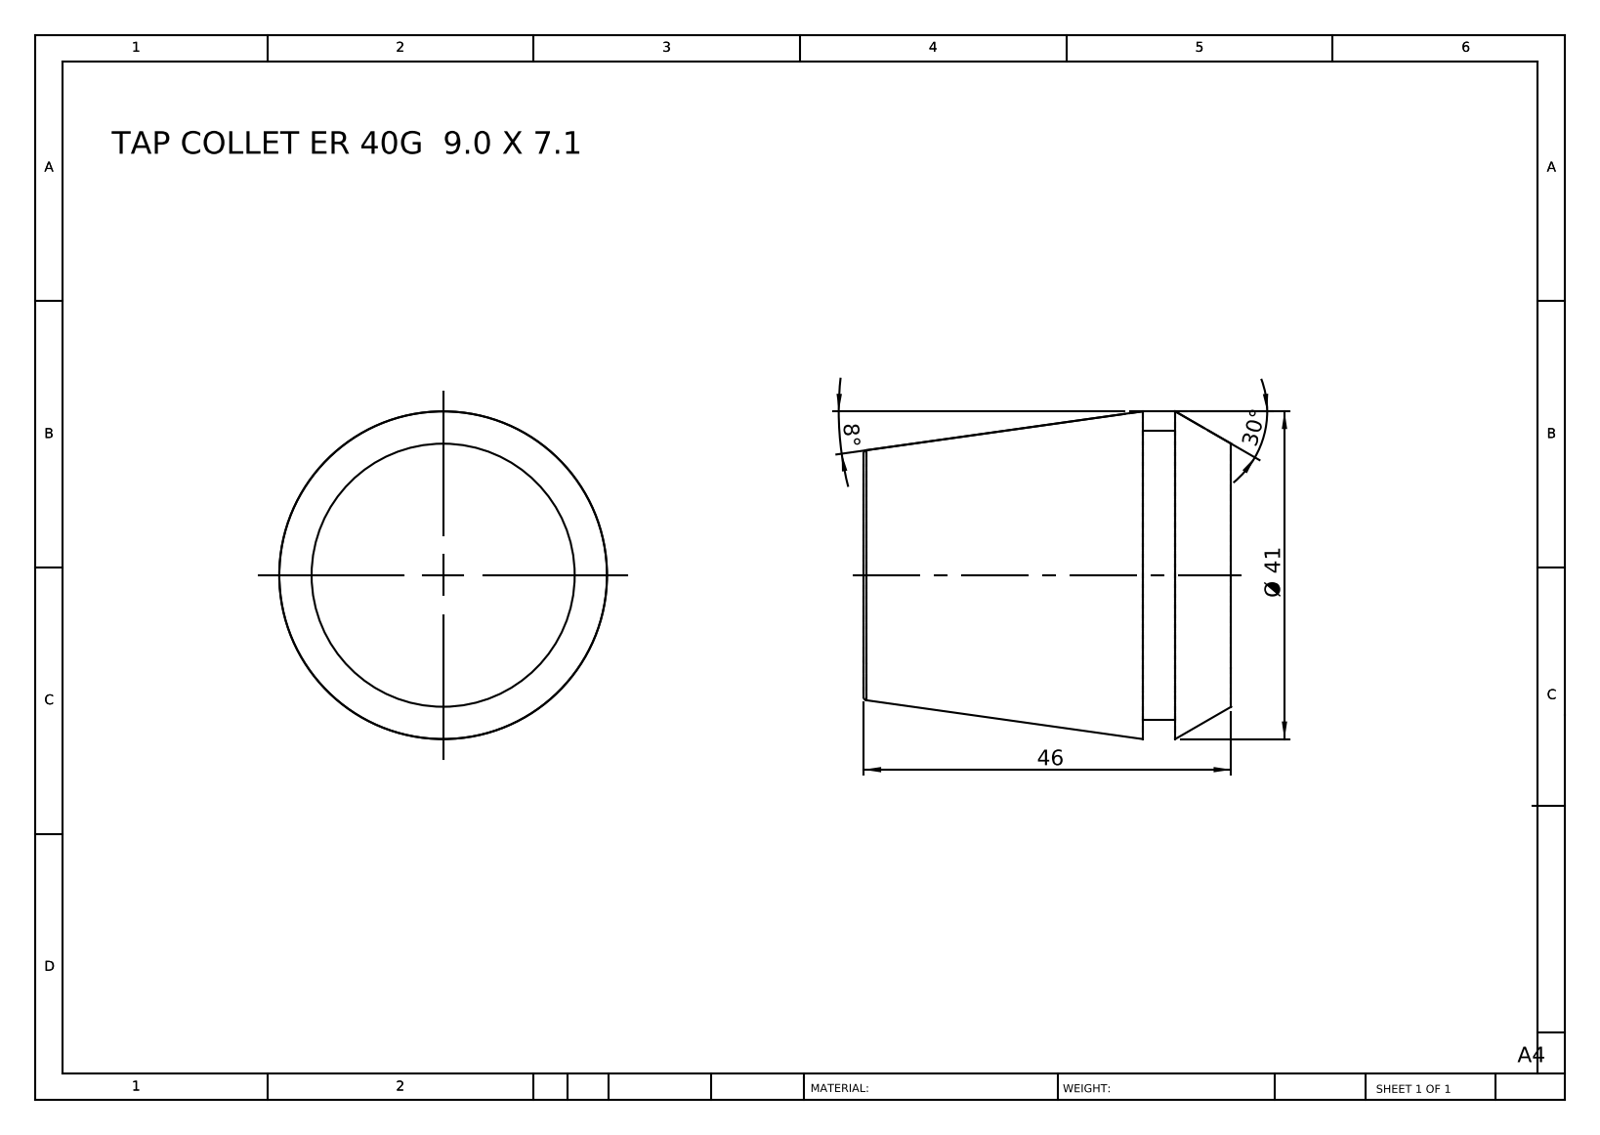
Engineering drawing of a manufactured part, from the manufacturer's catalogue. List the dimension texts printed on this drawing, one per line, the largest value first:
46
Ø 41
30°
8°
